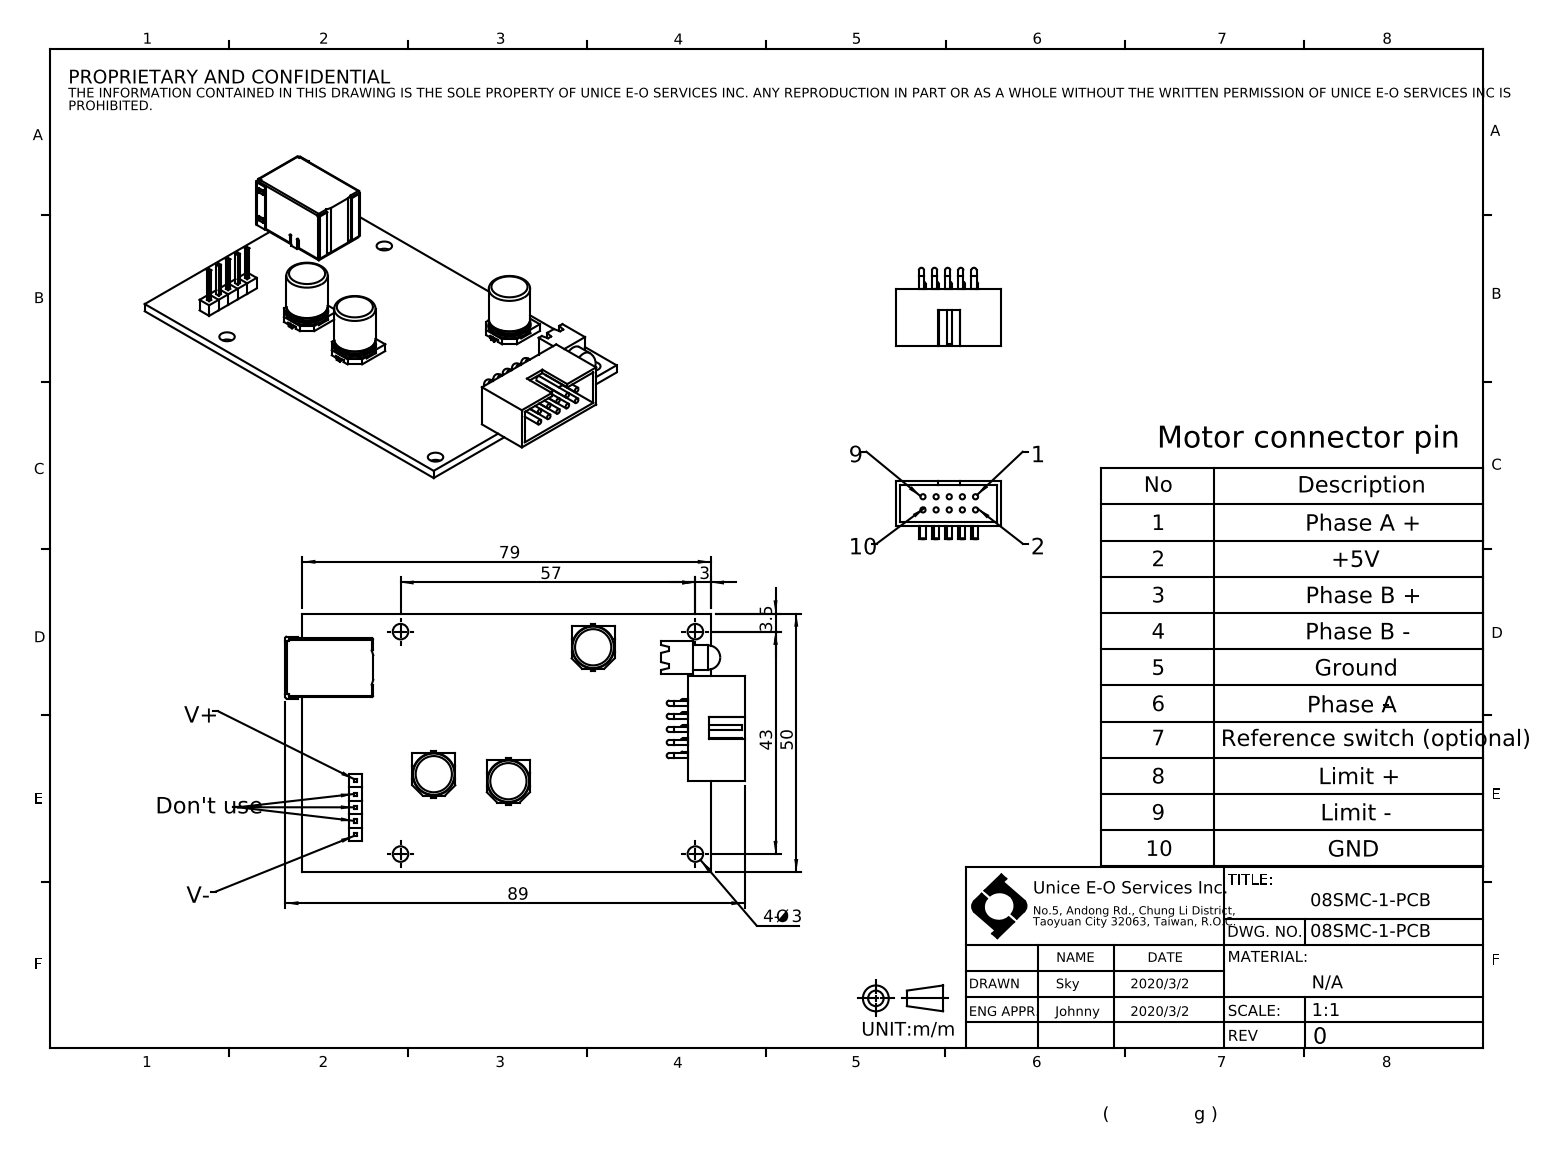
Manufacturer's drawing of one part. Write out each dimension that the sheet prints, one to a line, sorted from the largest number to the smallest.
89
79
57
50
43
3.5
3
4- Ø 3
